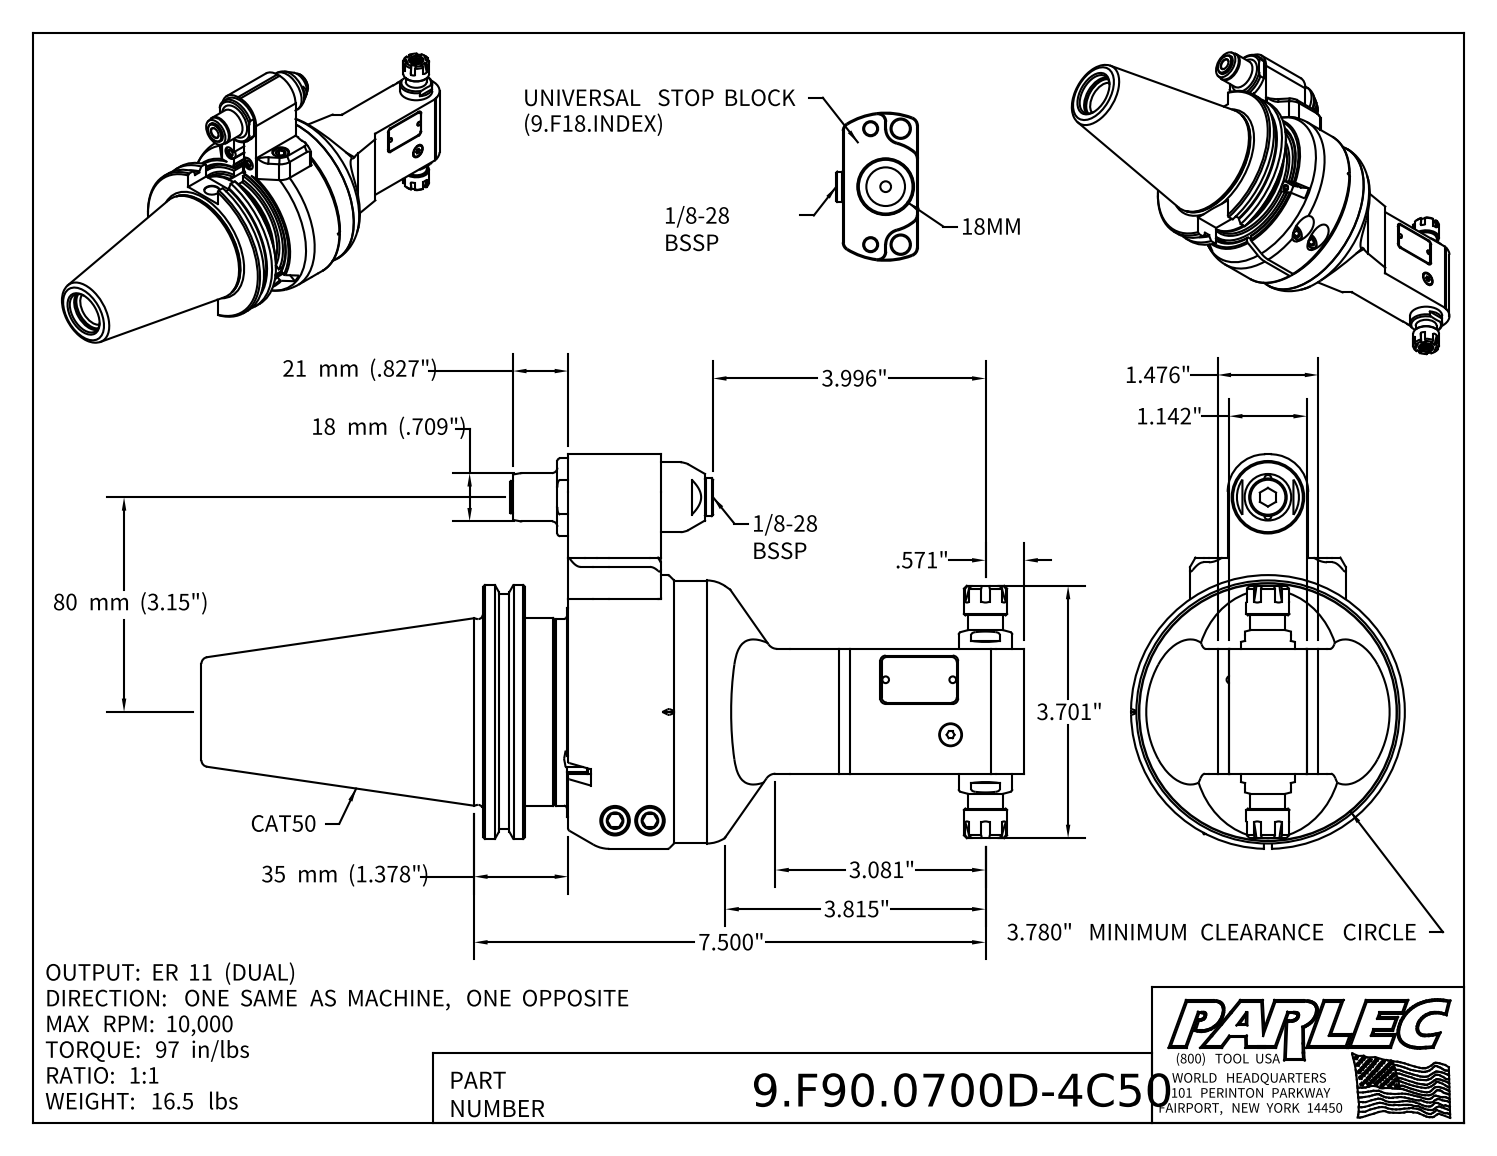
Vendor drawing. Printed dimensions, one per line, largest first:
80 mm (3.15")
35 mm (1.378")
21 mm (.827")
18 mm (.709")
7.500"
3.996"
3.815"
3.701"
3.081"
1.476"
1.142"
.571"
